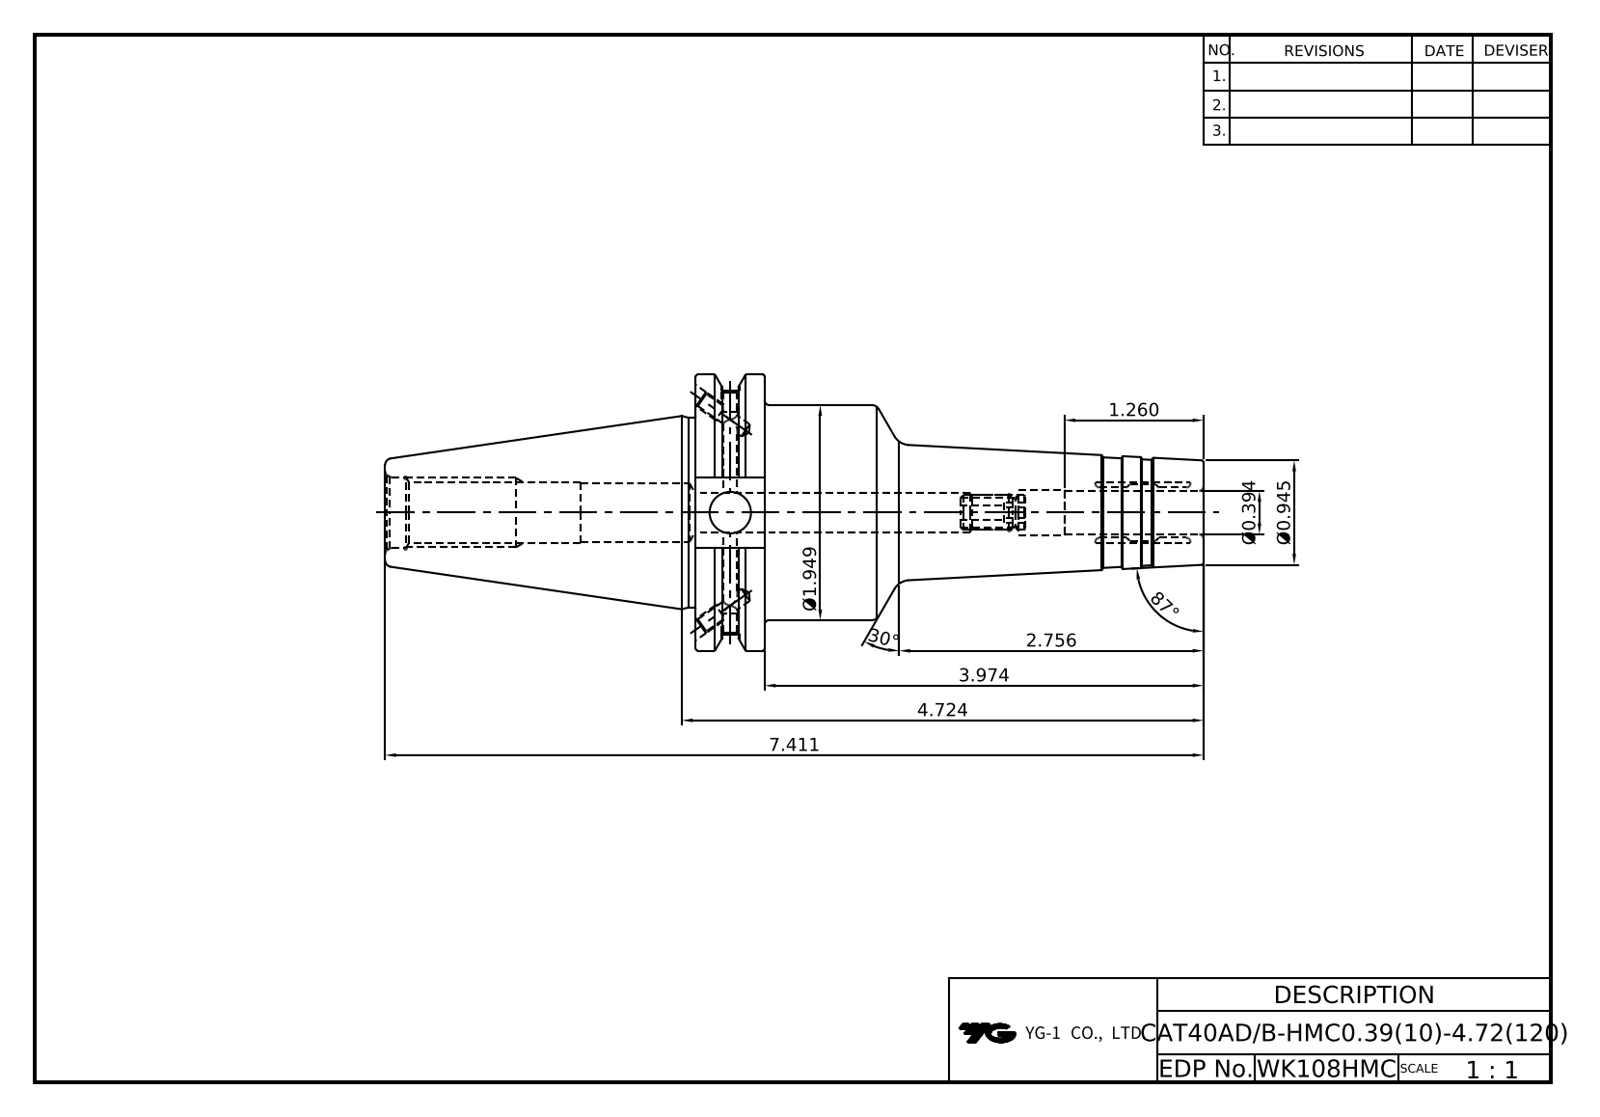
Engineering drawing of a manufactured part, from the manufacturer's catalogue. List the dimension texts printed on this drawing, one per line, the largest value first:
87°
30°
7.411
4.724
3.974
2.756
Ø1.949
1.260
Ø0.945
Ø0.394
